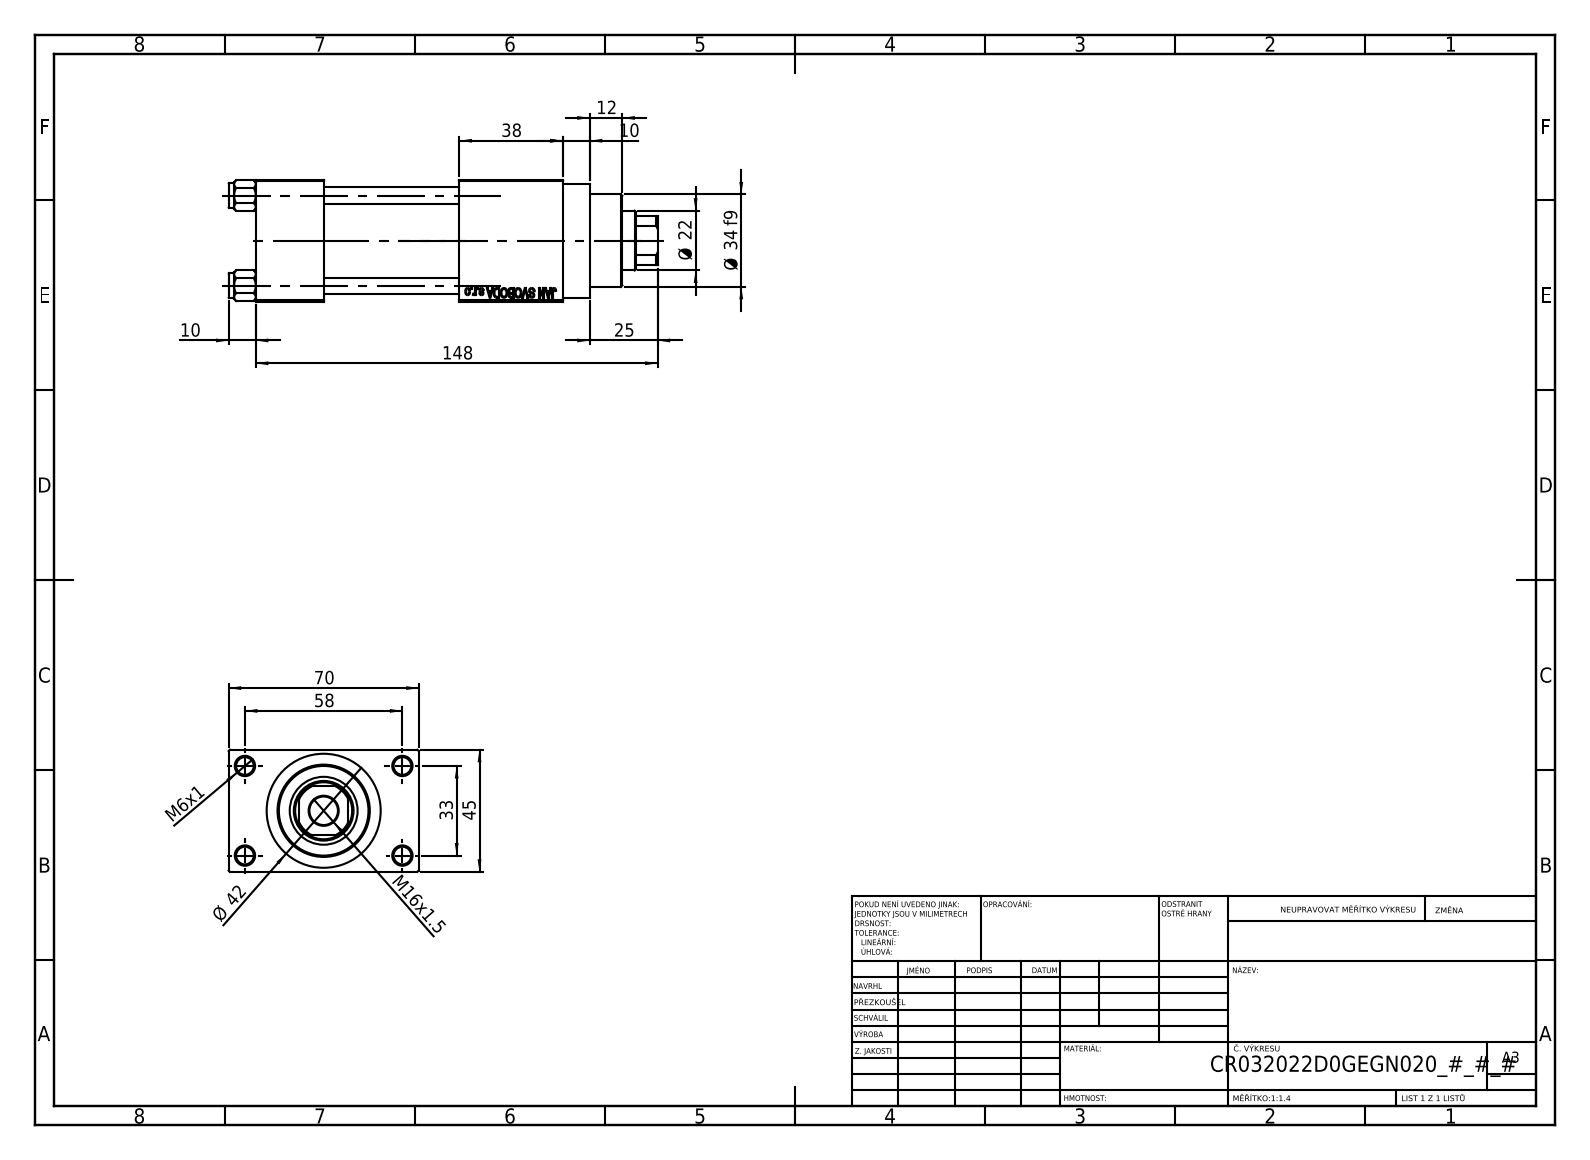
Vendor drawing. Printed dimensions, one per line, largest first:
148
70
58
45
Ø 42
38
Ø 34 f9
33
25
Ø 22
M16x1.5
12
10
10
M6x1
